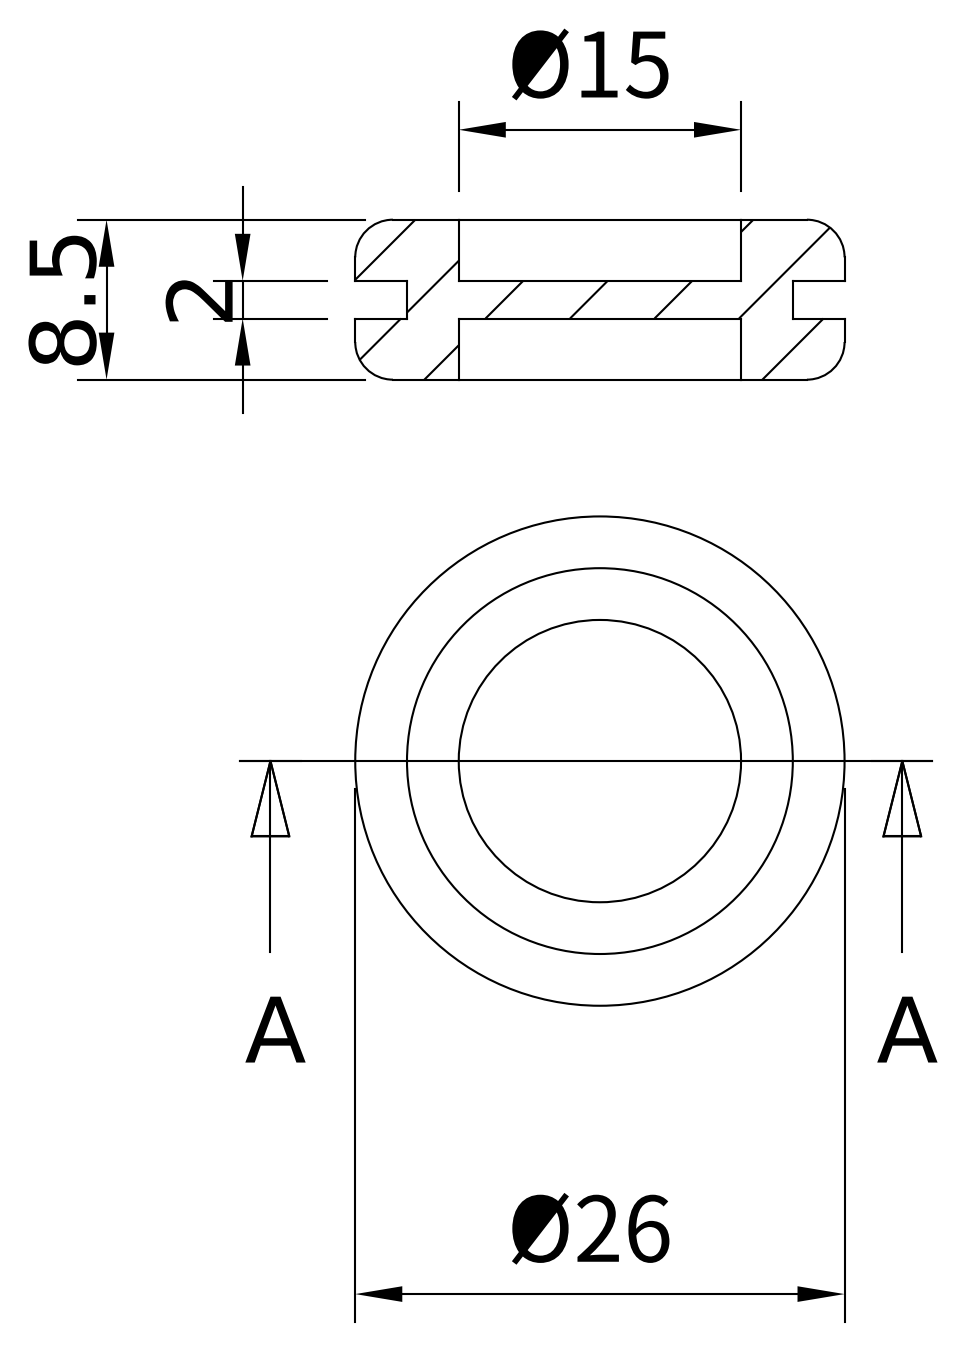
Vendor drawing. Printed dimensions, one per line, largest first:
Ø26
Ø15
8.5
2
